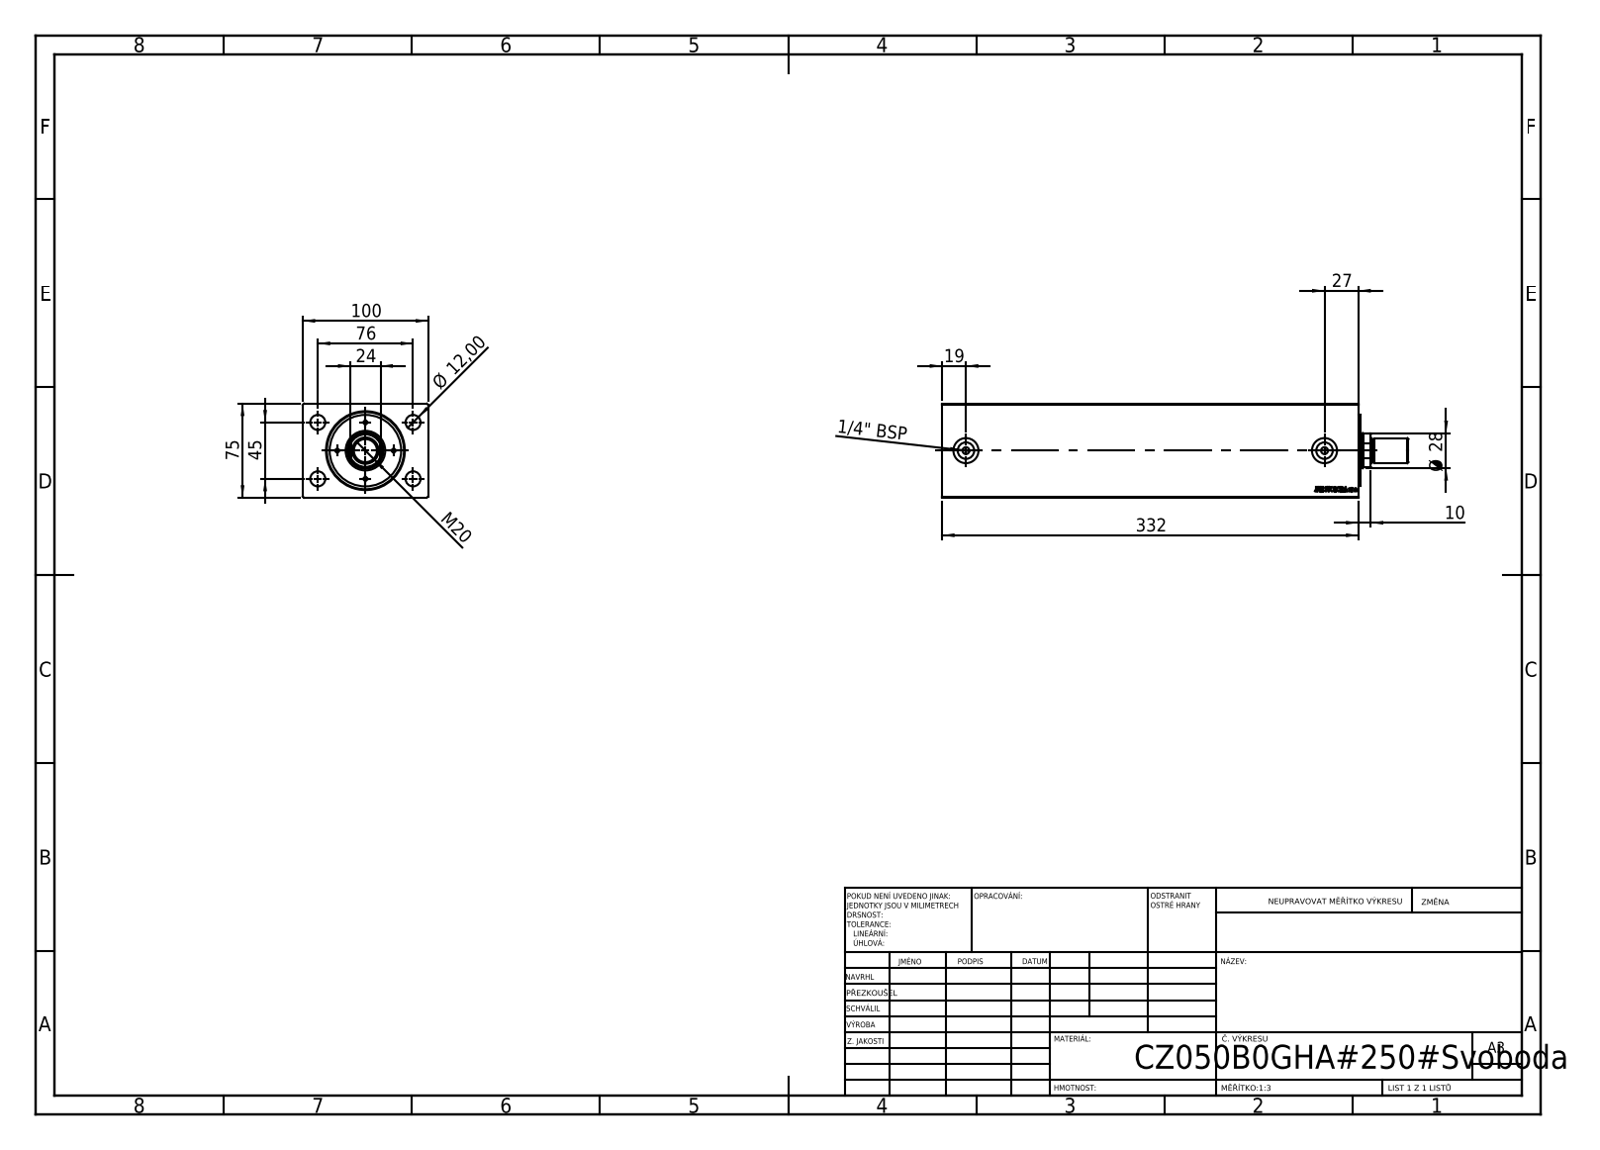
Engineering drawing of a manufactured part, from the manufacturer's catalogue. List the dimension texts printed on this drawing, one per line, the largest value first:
332
100
76
75
45
Ø 28
27
24
M20
19
Ø 12,00
10
1/4" BSP
